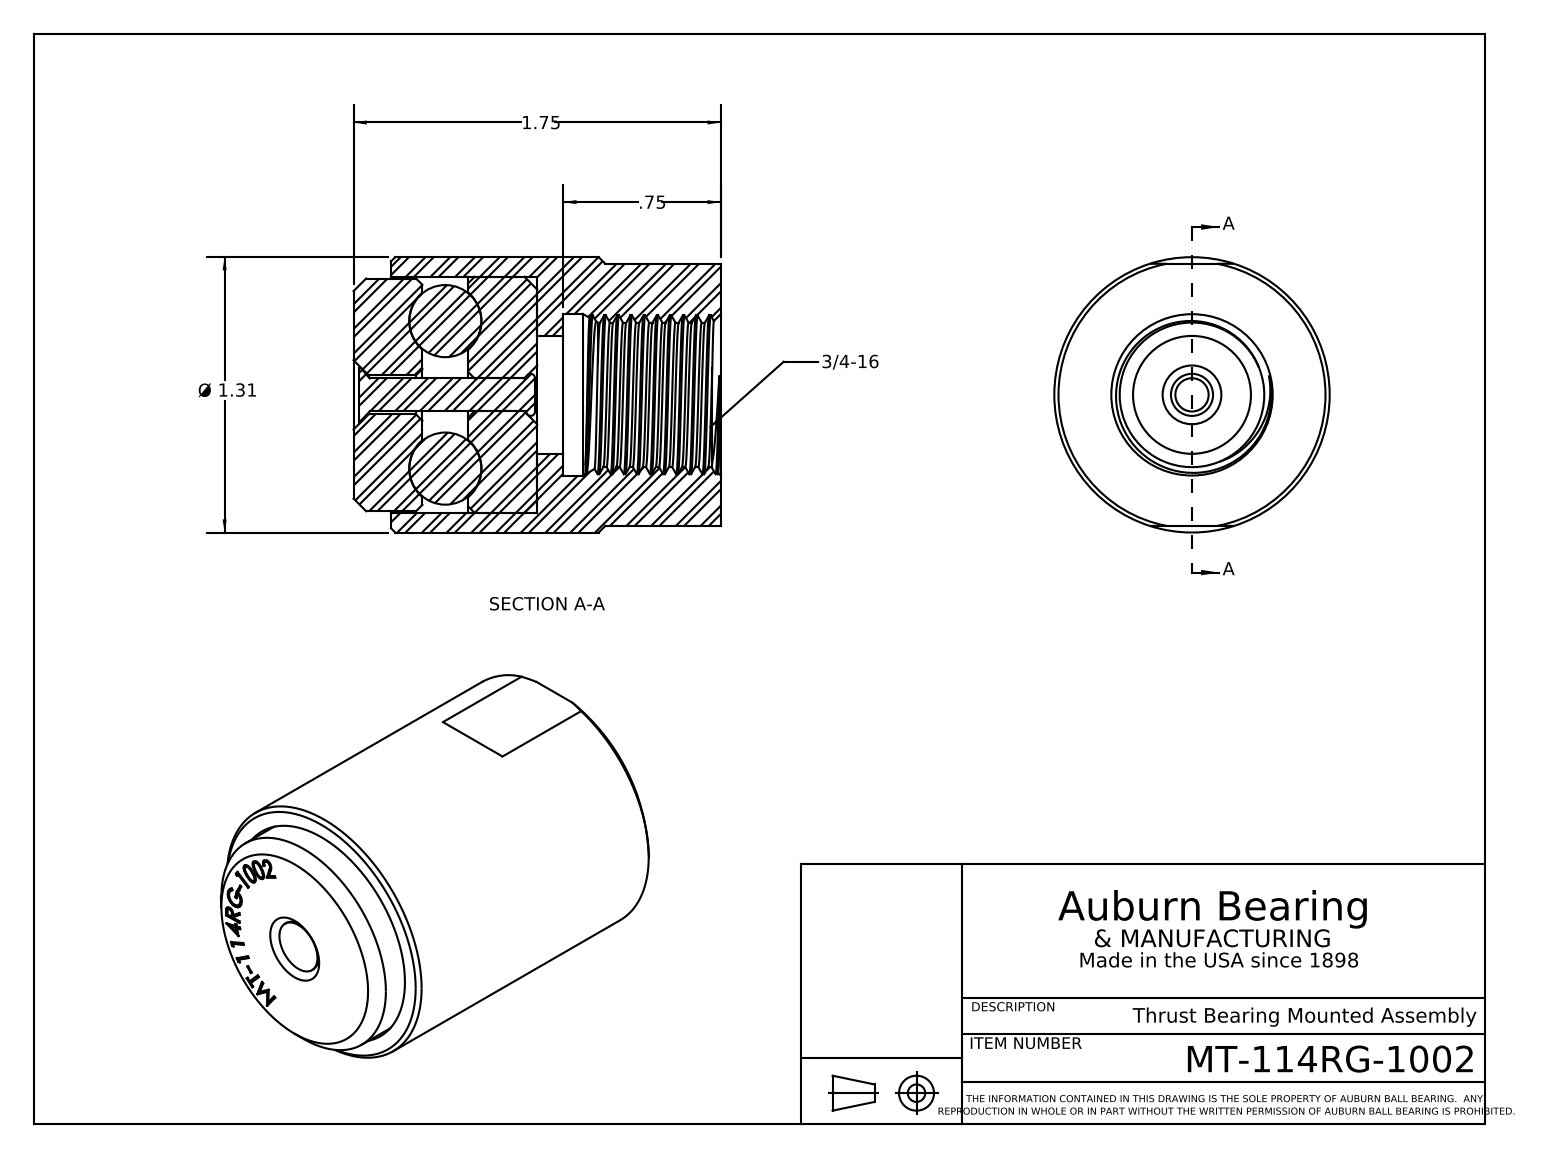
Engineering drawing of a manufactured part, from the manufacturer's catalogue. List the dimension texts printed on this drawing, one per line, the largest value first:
1.75
Ø 1.31
.75
